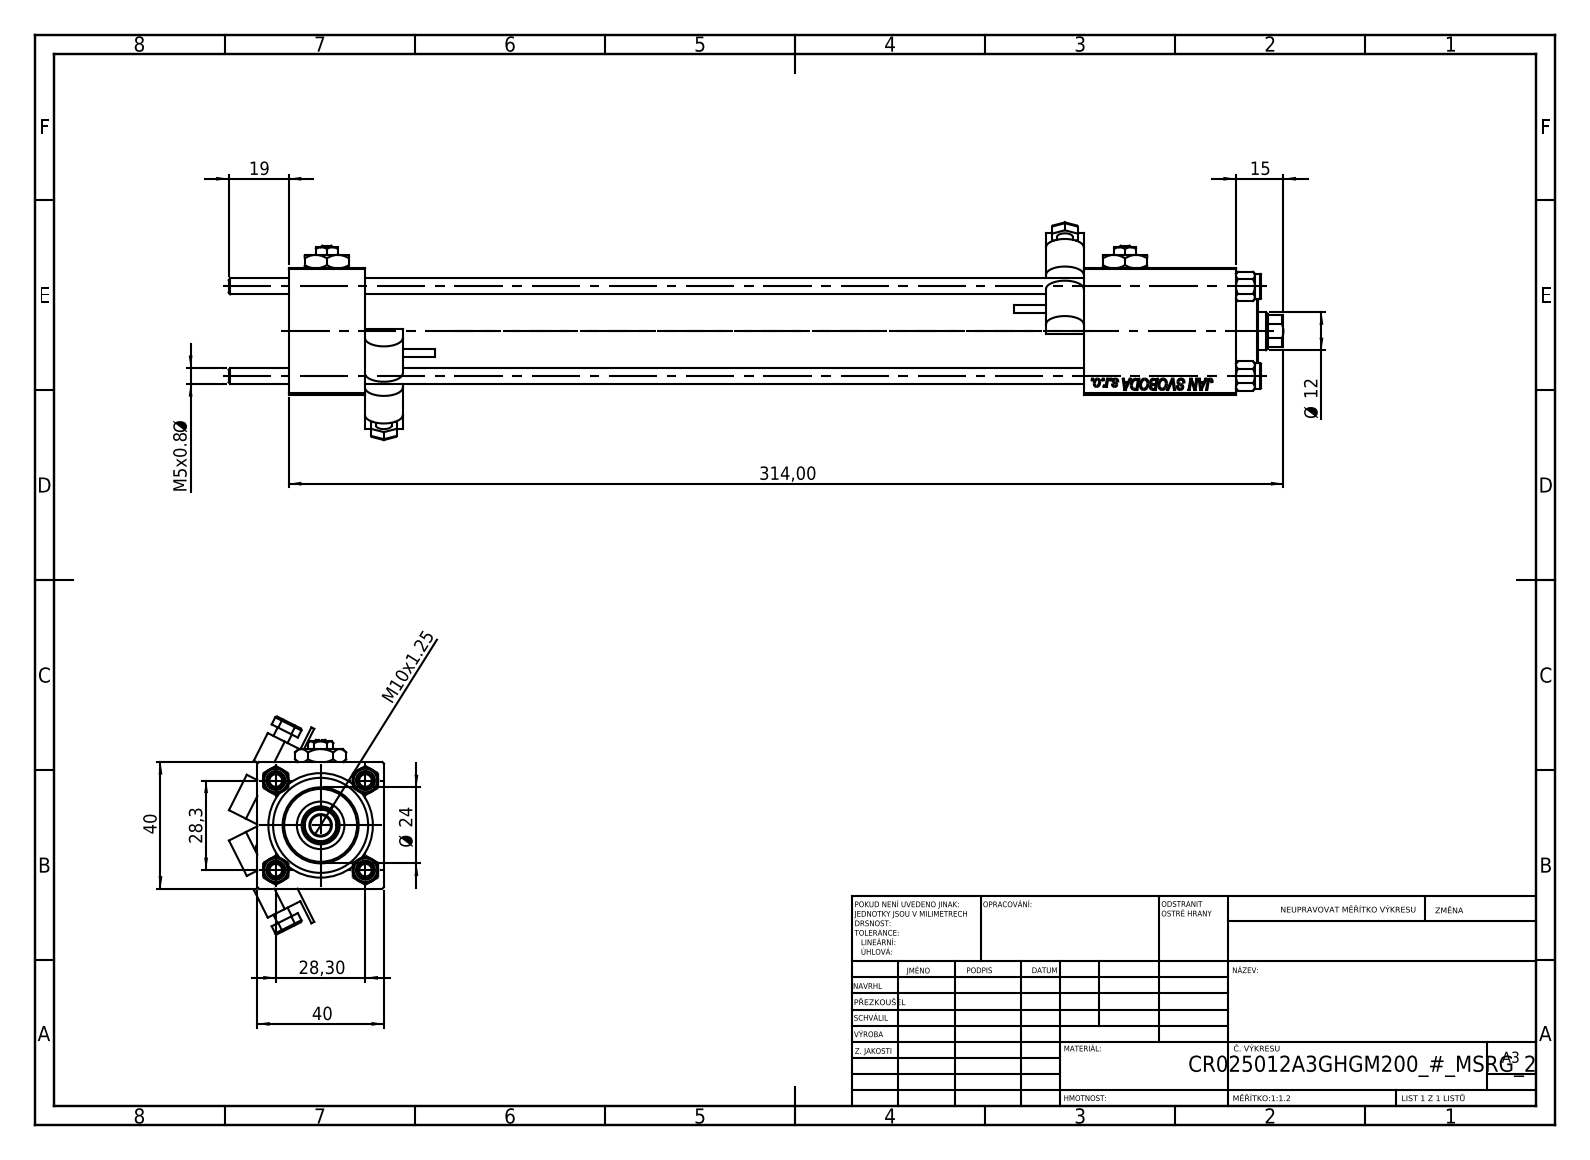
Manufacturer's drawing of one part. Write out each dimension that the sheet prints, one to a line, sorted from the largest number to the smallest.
314,00
40
40
28,3
28,30
Ø 24
19
15
Ø 12
M10x1.25
M5x0.8 Ø
